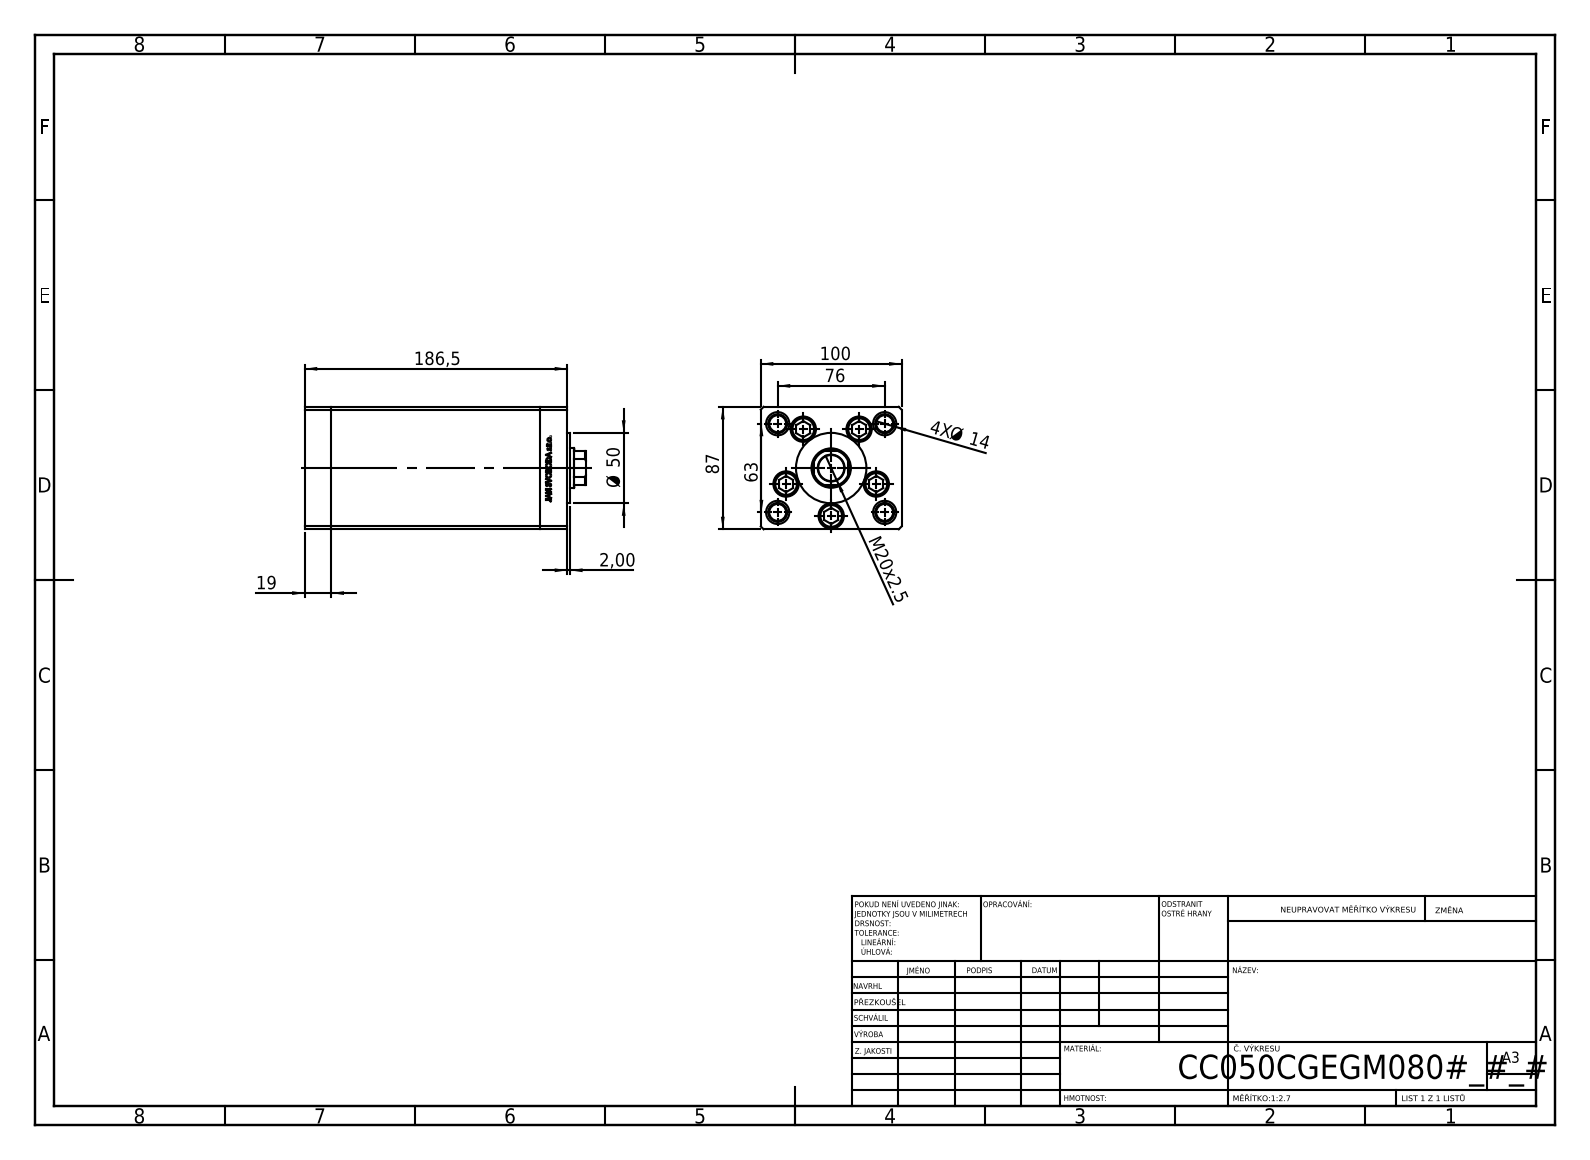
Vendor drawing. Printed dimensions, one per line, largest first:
186,5
100
87
76
63
Ø 50
M20x2.5
19
4X Ø 14
2,00
